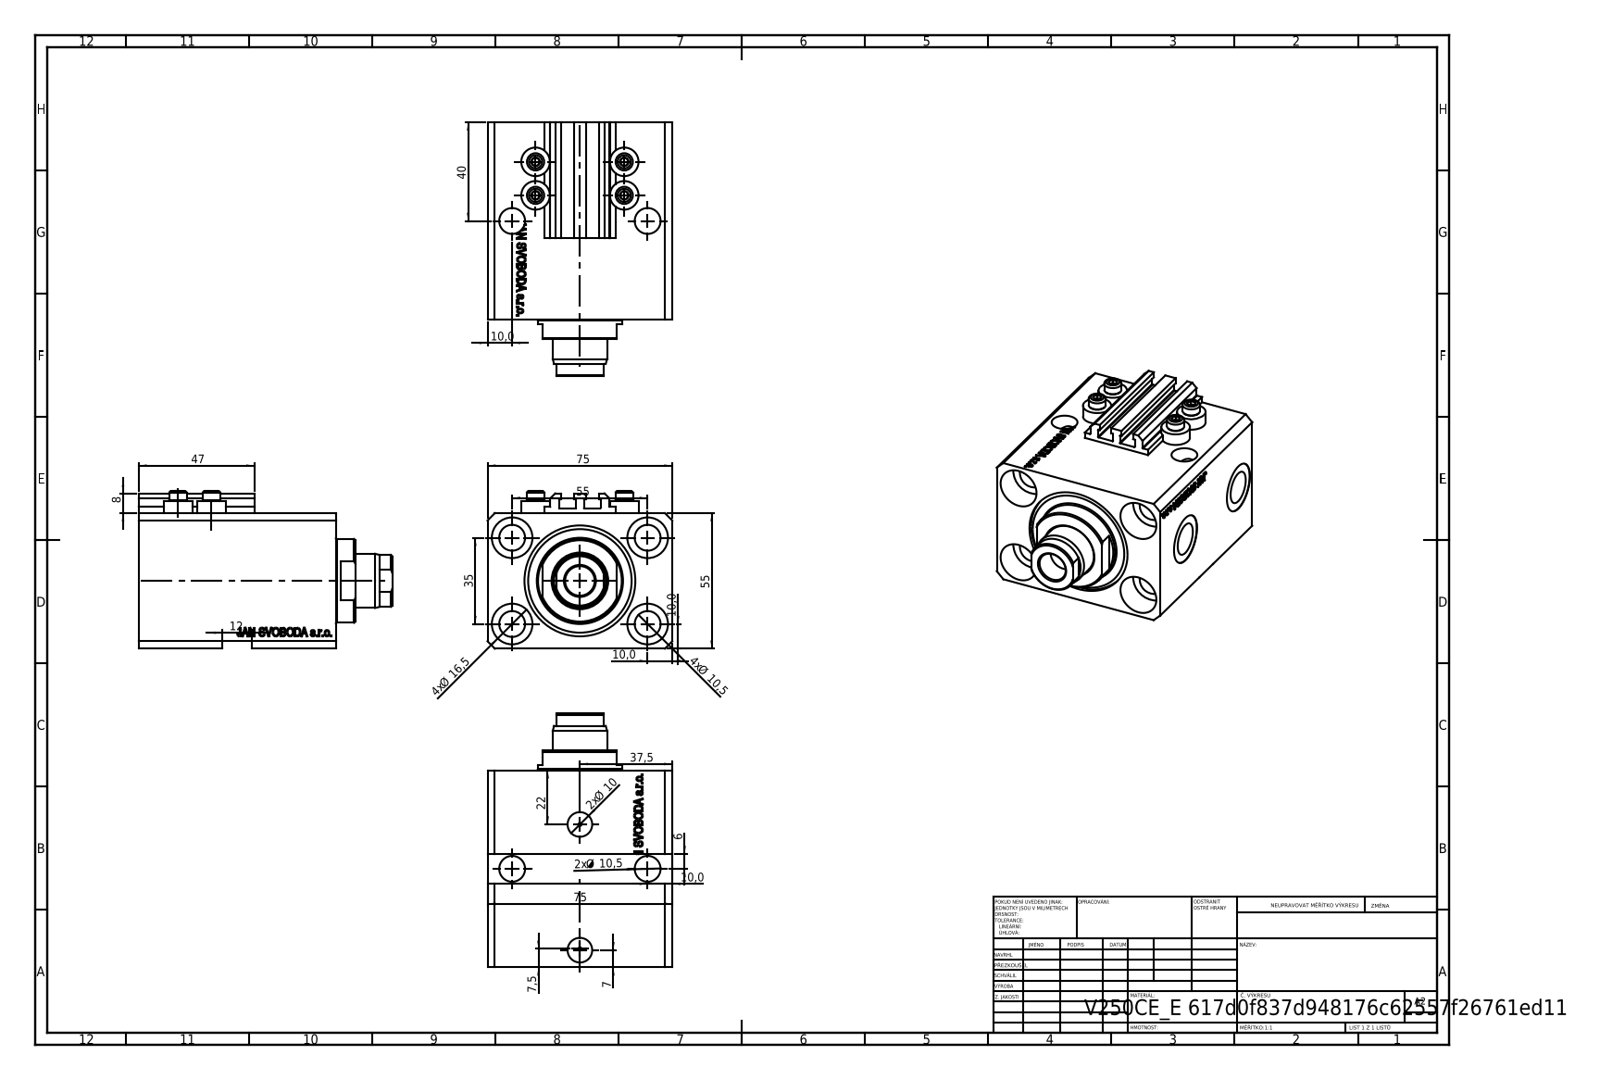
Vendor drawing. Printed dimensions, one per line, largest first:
75
75
55
55
47
40
37,5
35
22
4x Ø 16,5
12
4x Ø 10,5
2x Ø 10,5
10,0
10,0
10,0
2x Ø 10
10,0
8
7,5
7
6
